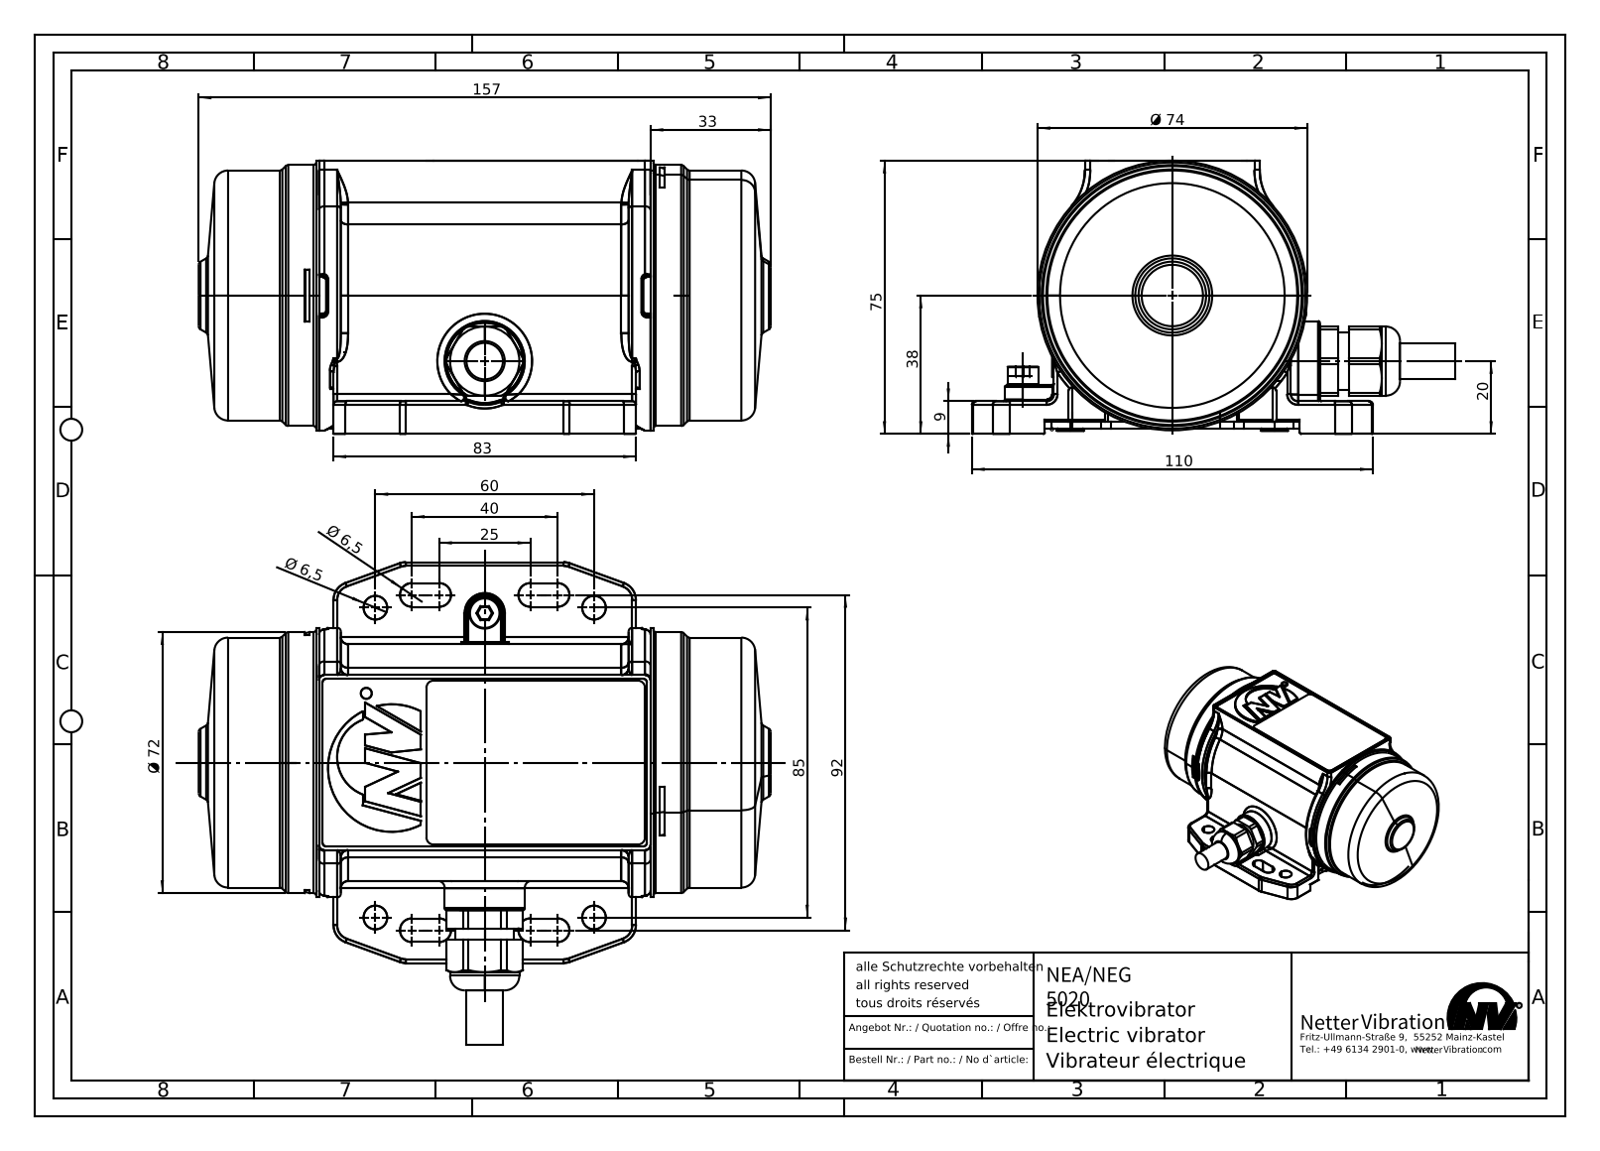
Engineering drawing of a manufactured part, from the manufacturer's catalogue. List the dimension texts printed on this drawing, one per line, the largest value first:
157
110
92
85
83
75
Ø 74
Ø 72
60
40
38
33
25
20
9
Ø 6,5
Ø 6,5
